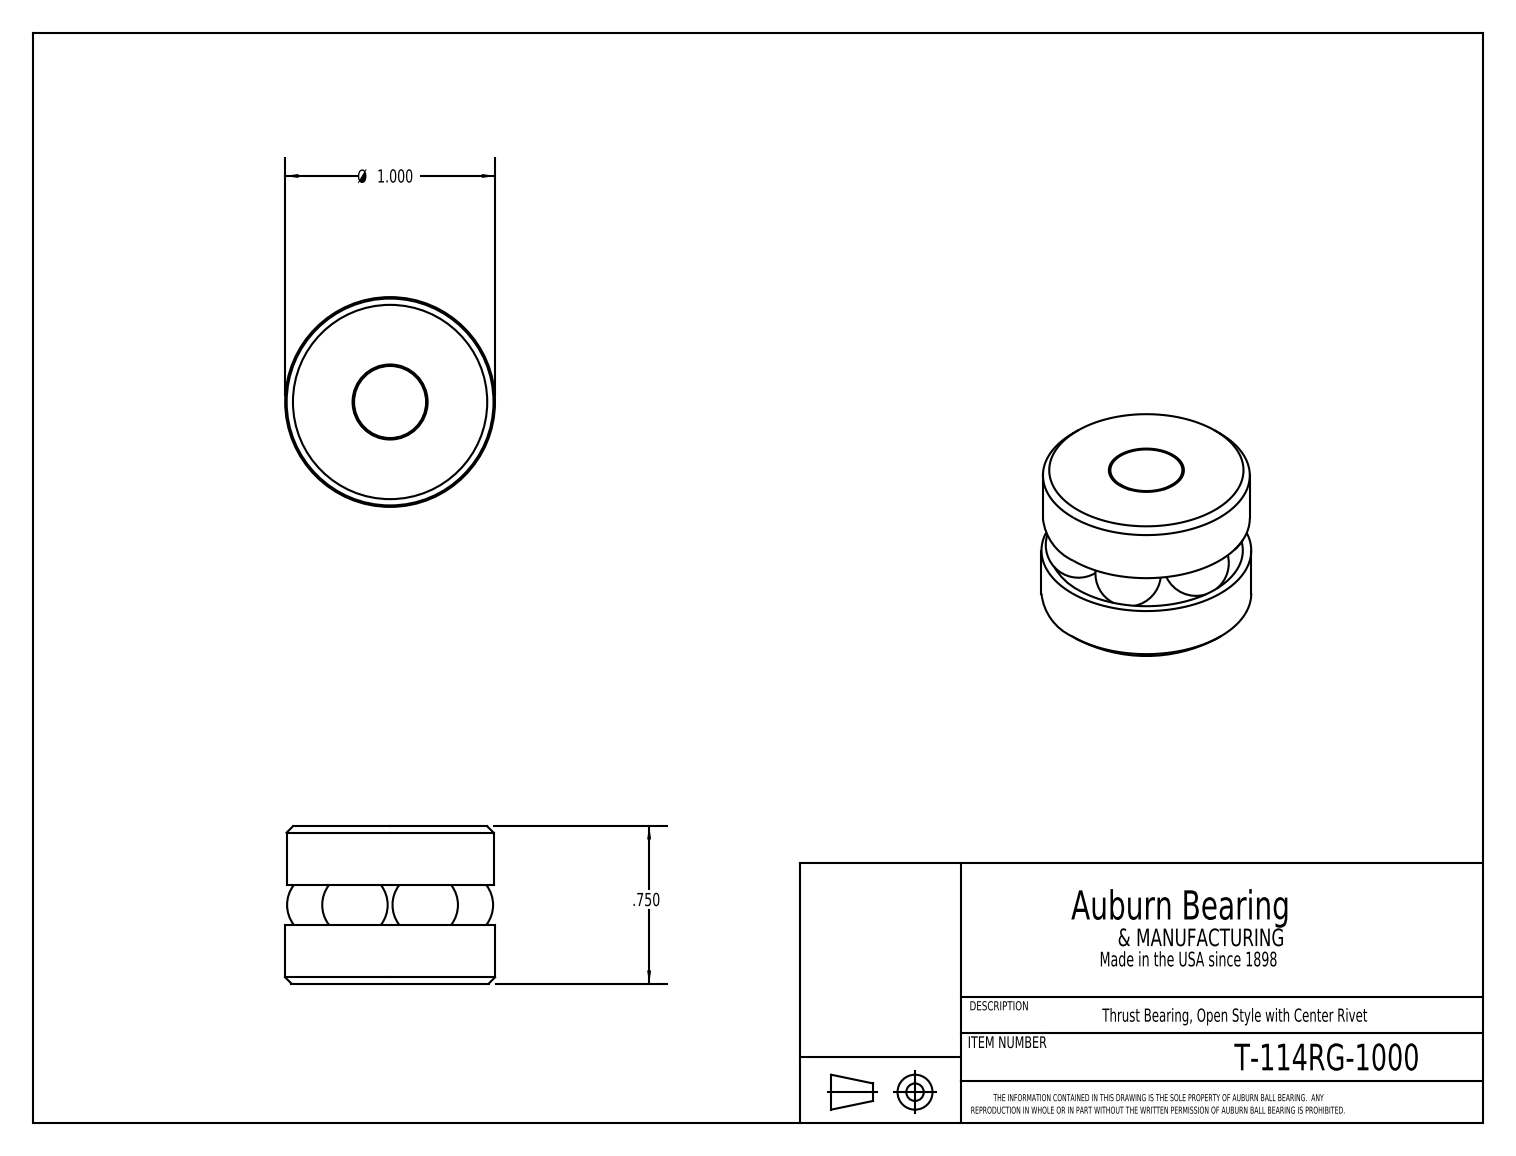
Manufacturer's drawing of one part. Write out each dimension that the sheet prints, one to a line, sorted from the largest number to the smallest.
Ø 1.000
.750
